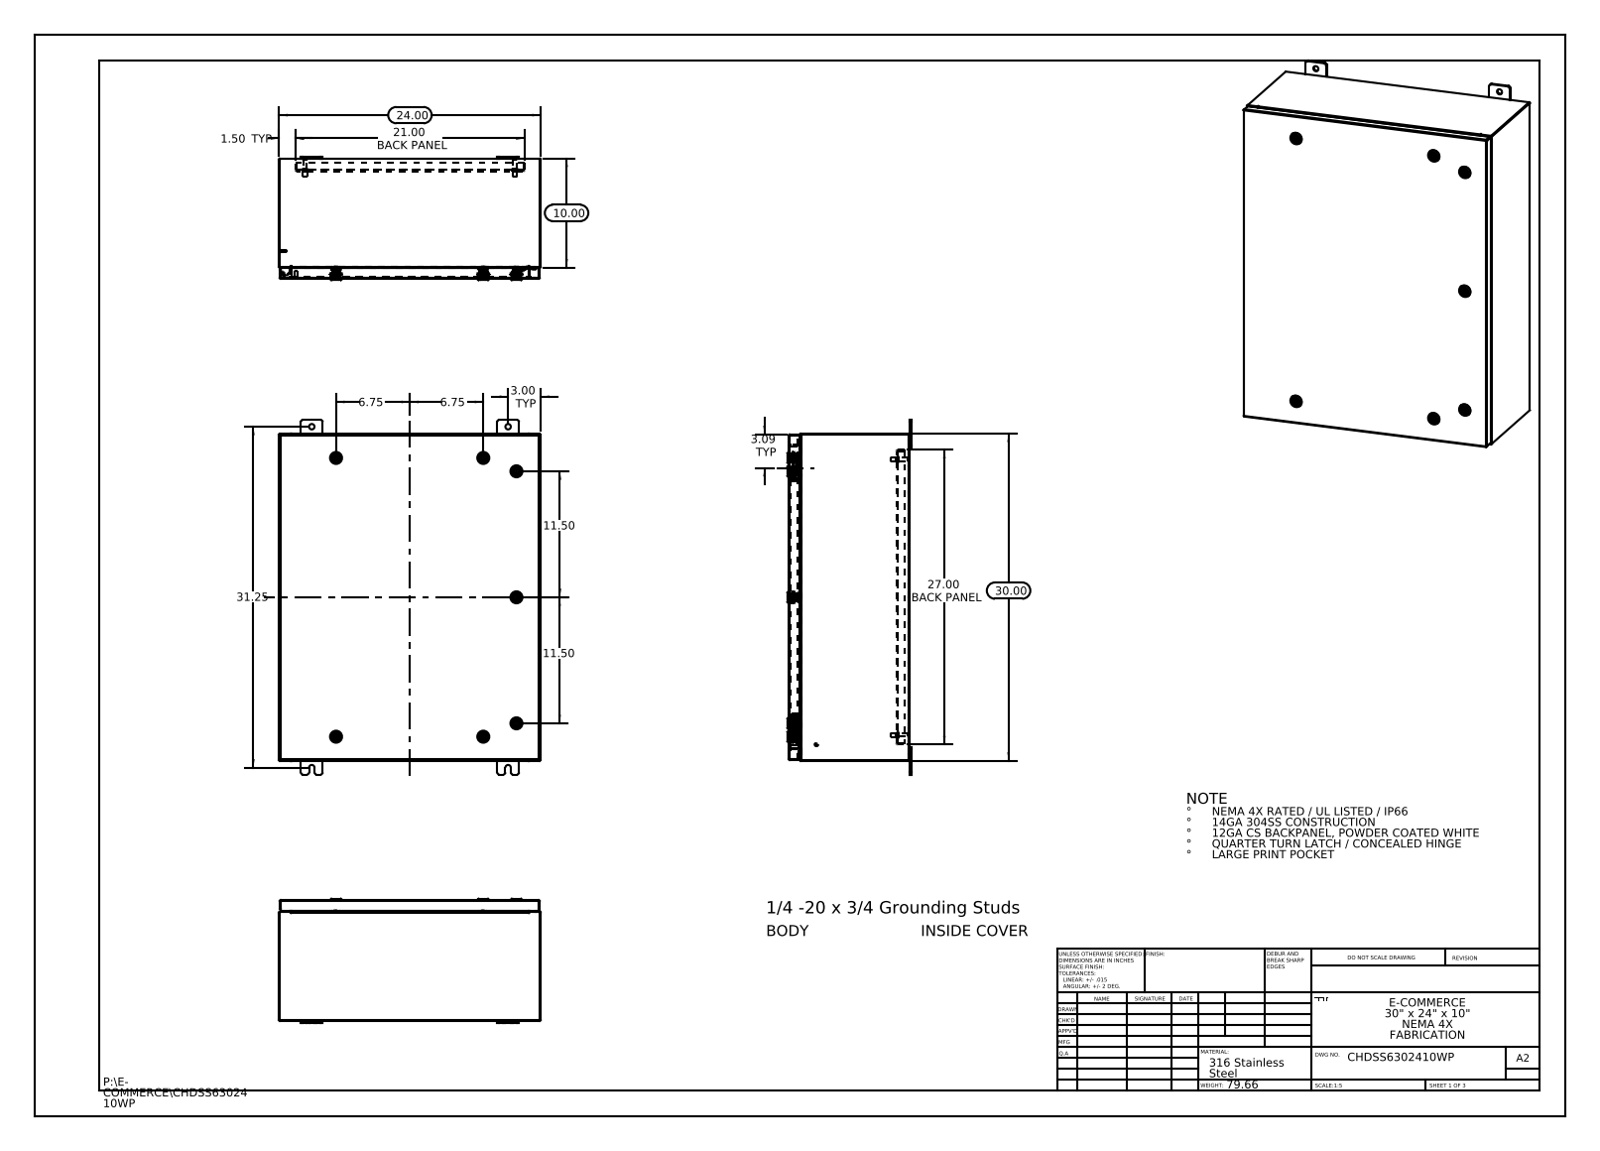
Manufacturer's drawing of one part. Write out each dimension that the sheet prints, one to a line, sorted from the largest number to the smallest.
31.25
30.00
27.00 BACK PANEL
24.00
21.00 BACK PANEL
11.50
11.50
10.00
6.75
6.75
3.09 TYP
3.00 TYP
1.50 TYP
